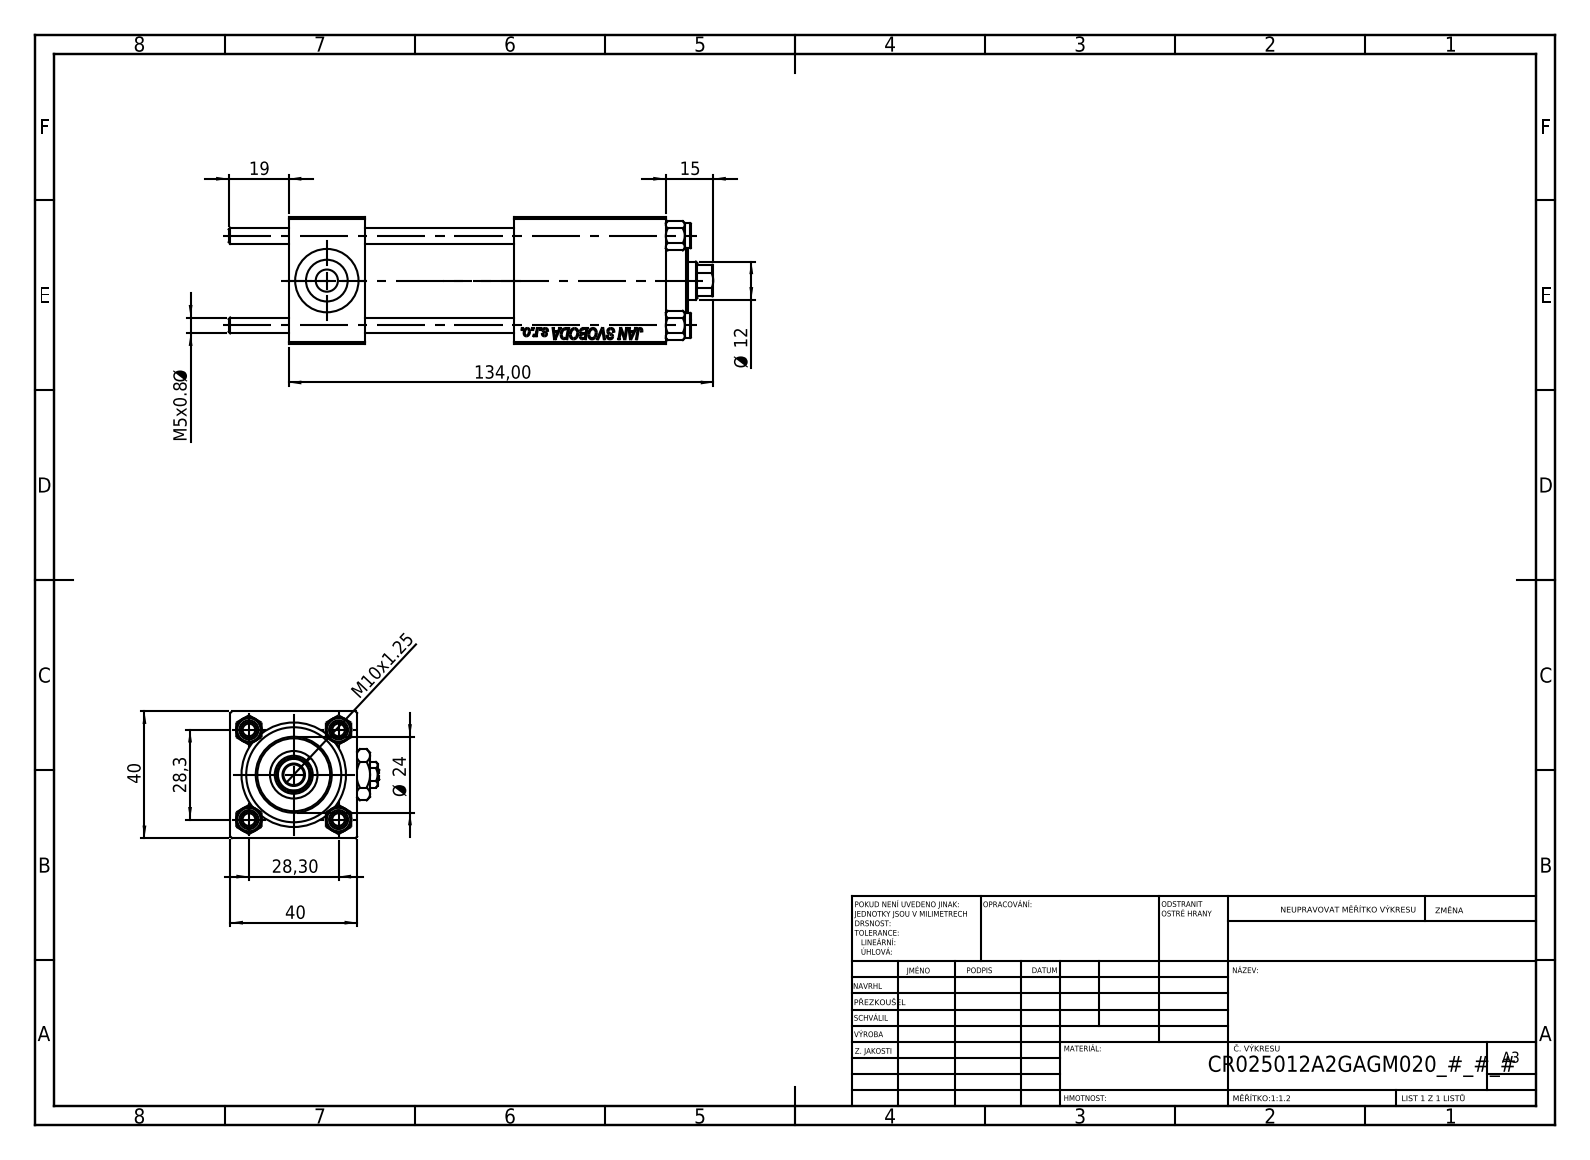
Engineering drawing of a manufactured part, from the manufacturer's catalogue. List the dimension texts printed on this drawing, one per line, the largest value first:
134,00
40
40
28,3
28,30
Ø 24
19
15
Ø 12
M10x1.25
M5x0.8 Ø
